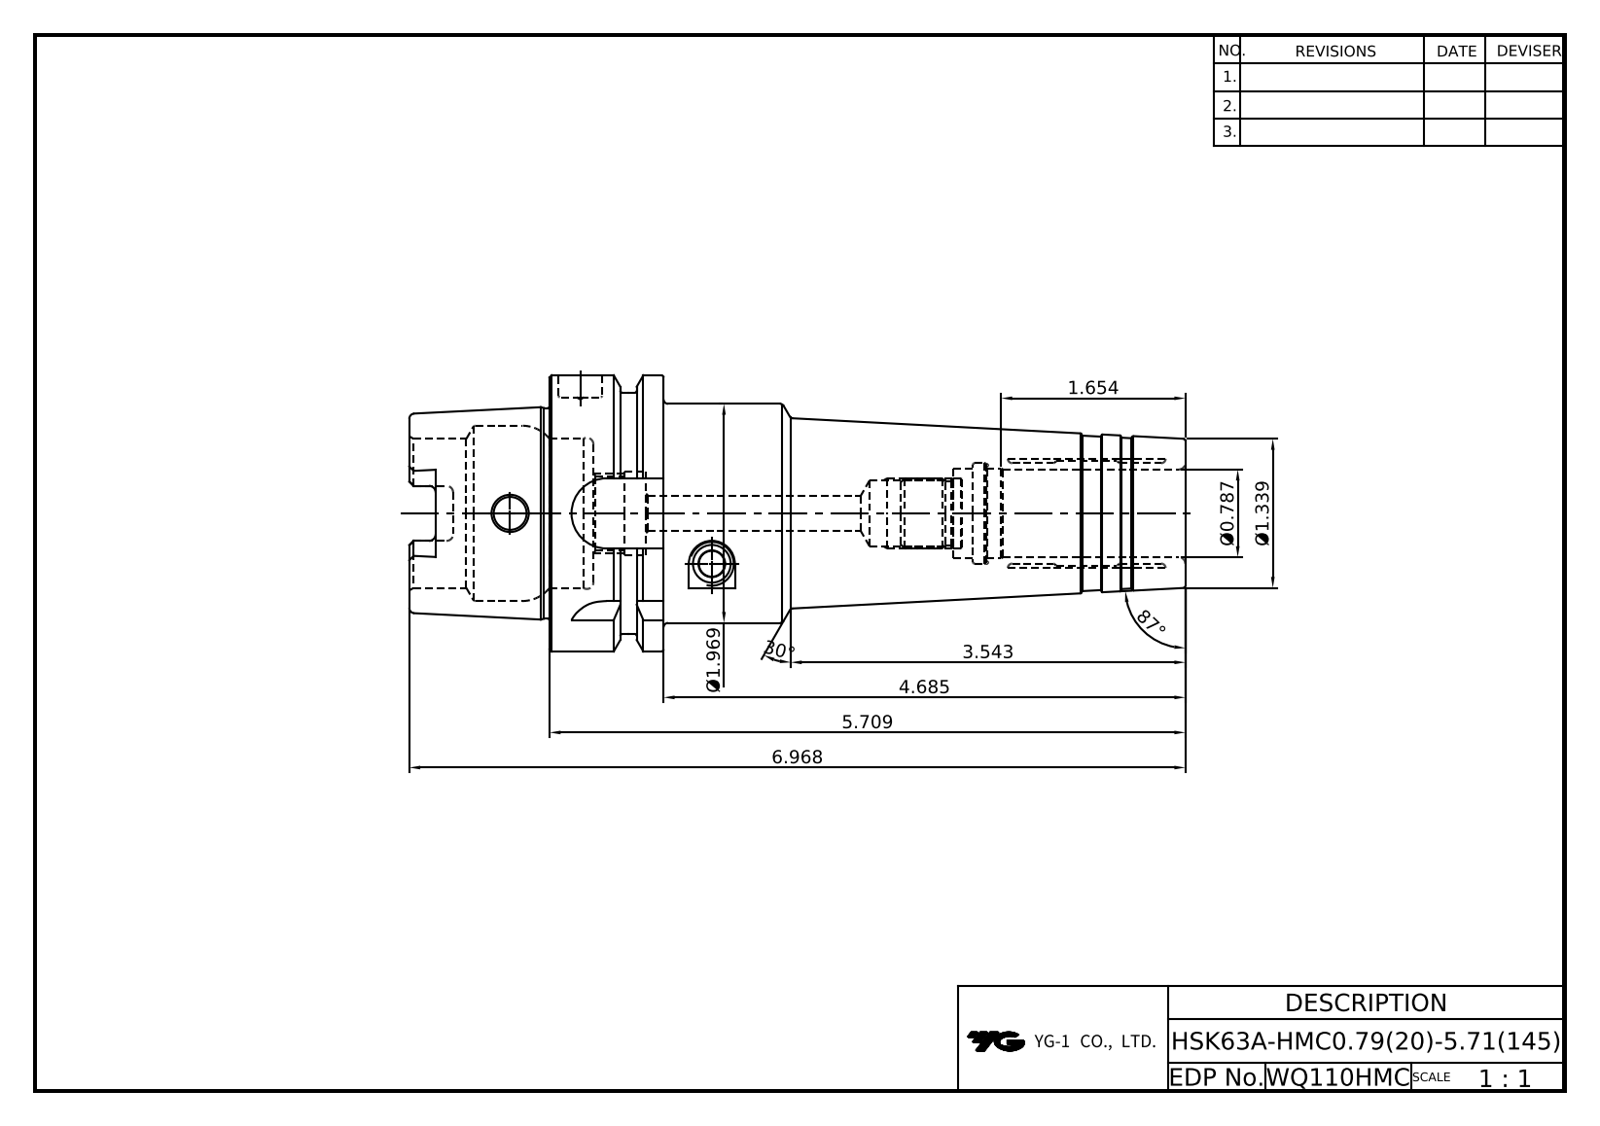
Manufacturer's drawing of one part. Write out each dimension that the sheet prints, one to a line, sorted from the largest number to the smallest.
87°
30°
6.968
5.709
4.685
3.543
Ø1.969
1.654
Ø1.339
Ø0.787
